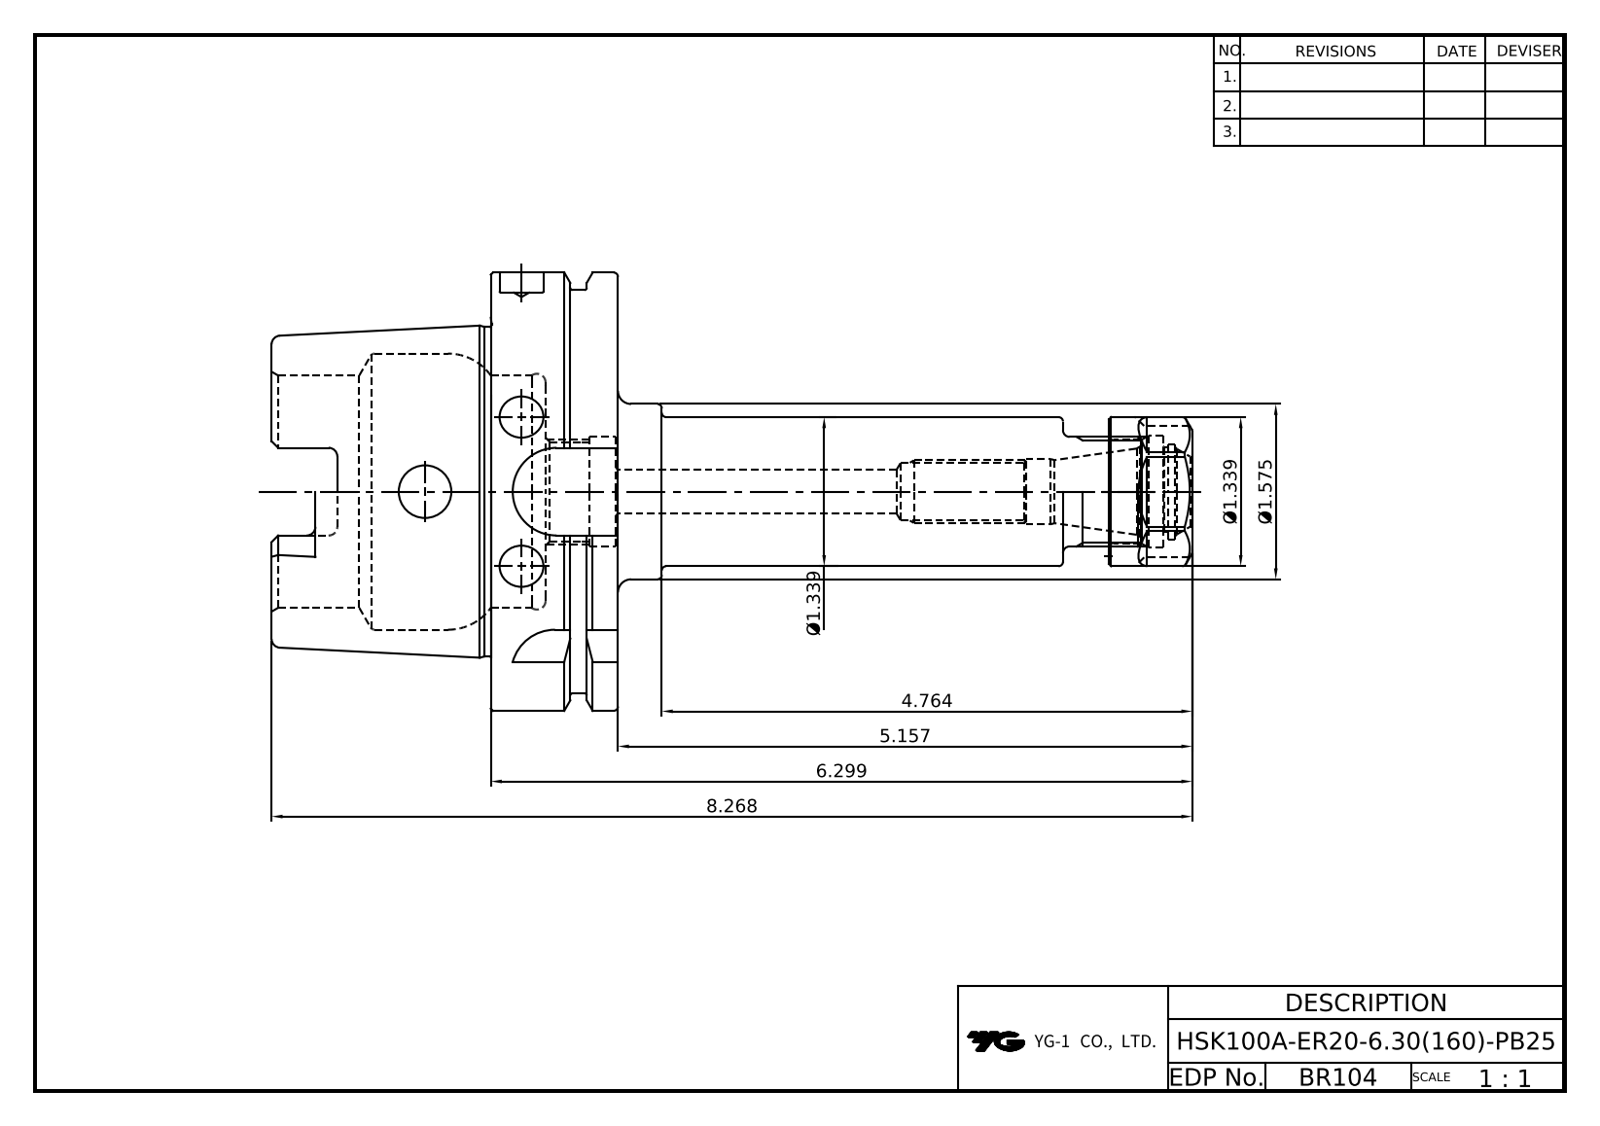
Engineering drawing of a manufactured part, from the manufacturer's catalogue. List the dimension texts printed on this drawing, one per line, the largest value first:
8.268
6.299
5.157
4.764
Ø1.575
Ø1.339
Ø1.339
